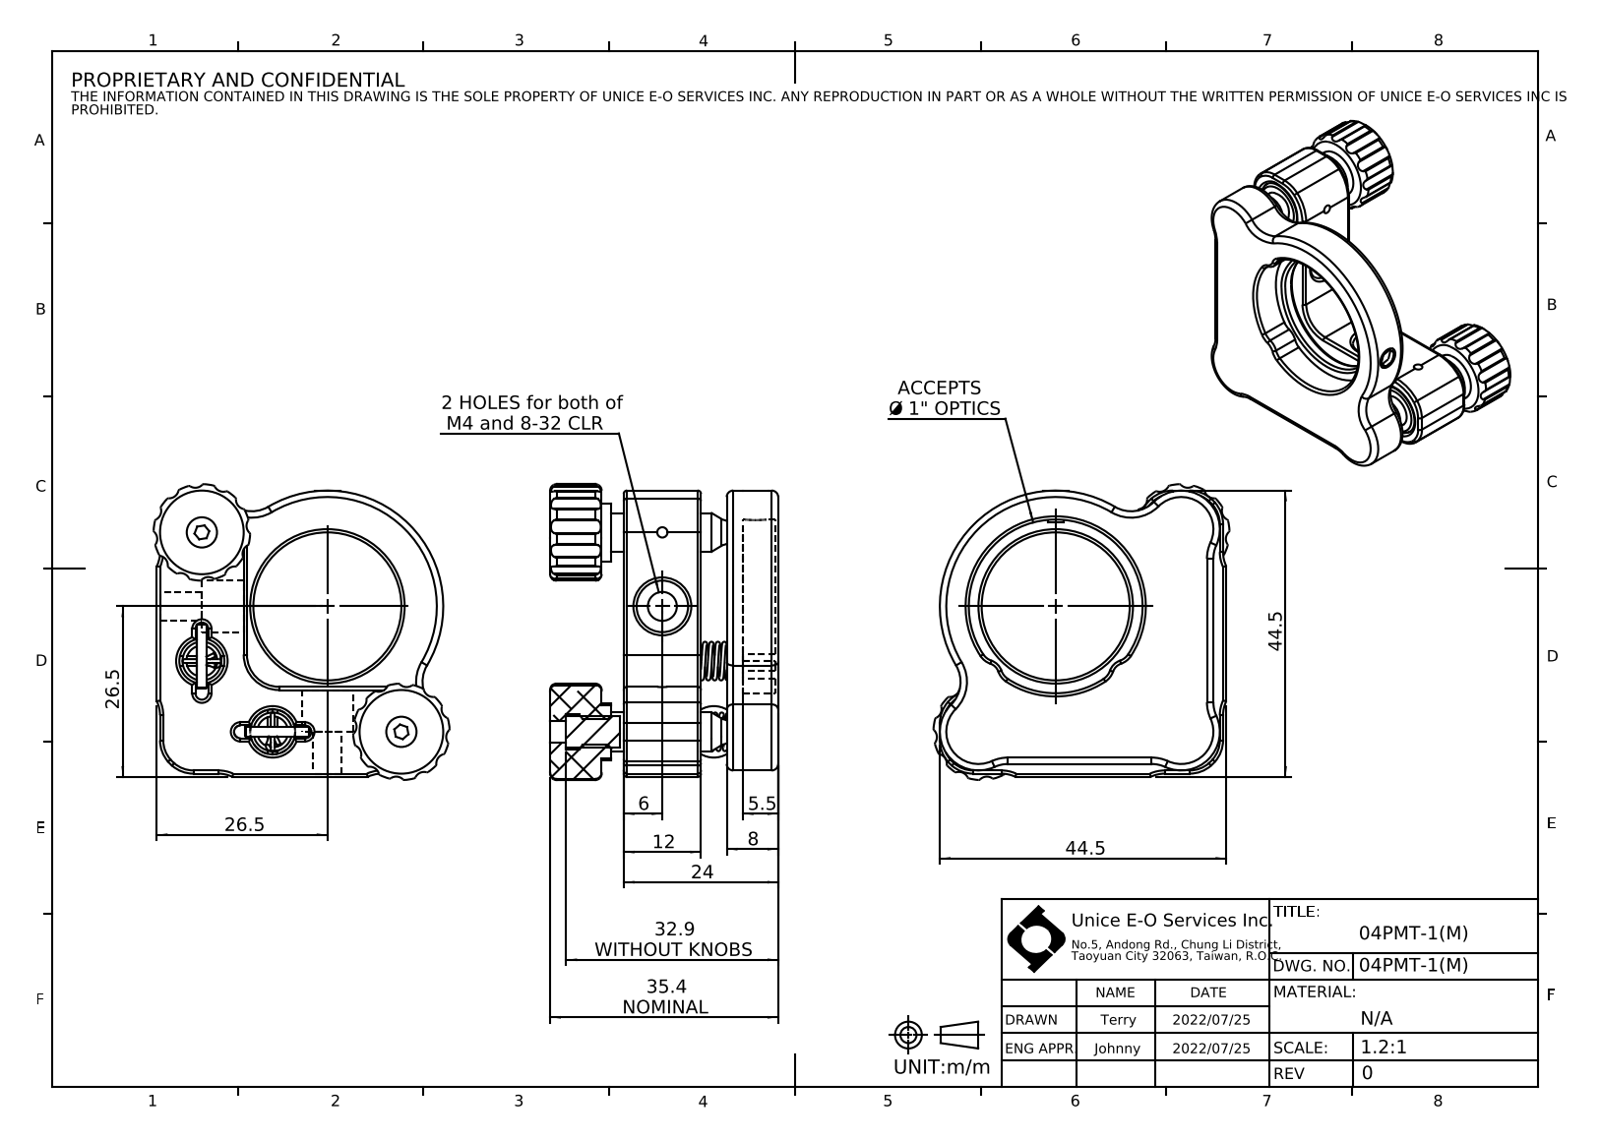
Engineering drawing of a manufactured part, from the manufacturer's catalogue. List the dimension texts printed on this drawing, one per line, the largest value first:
44.5
44.5
35.4 NOMINAL
32.9 WITHOUT KNOBS
26.5
26.5
24
12
8
6
5.5
2 HOLES for both of M4 and 8-32 CLR
ACCEPTS Ø 1" OPTICS
